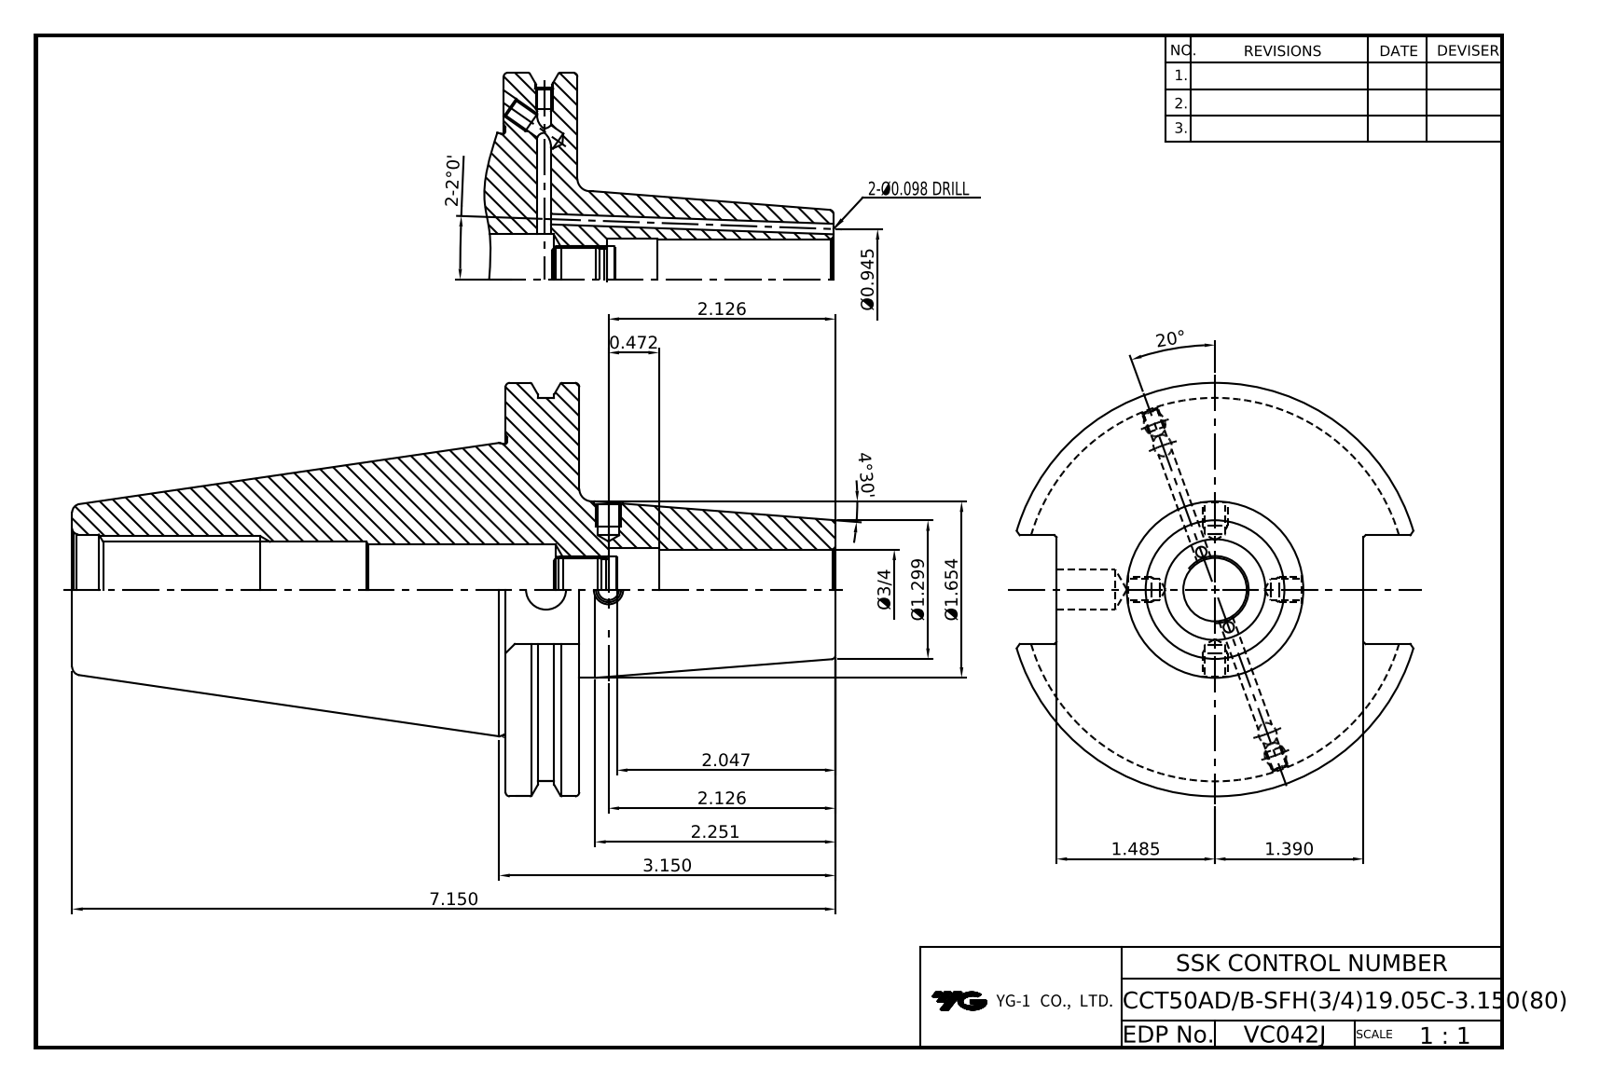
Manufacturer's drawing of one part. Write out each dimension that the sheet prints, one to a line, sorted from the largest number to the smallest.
20°
7.150
4°30'
3.150
2.251
2.126
2.126
2.047
2-2°0'
Ø1.654
1.485
1.390
Ø1.299
0.472
